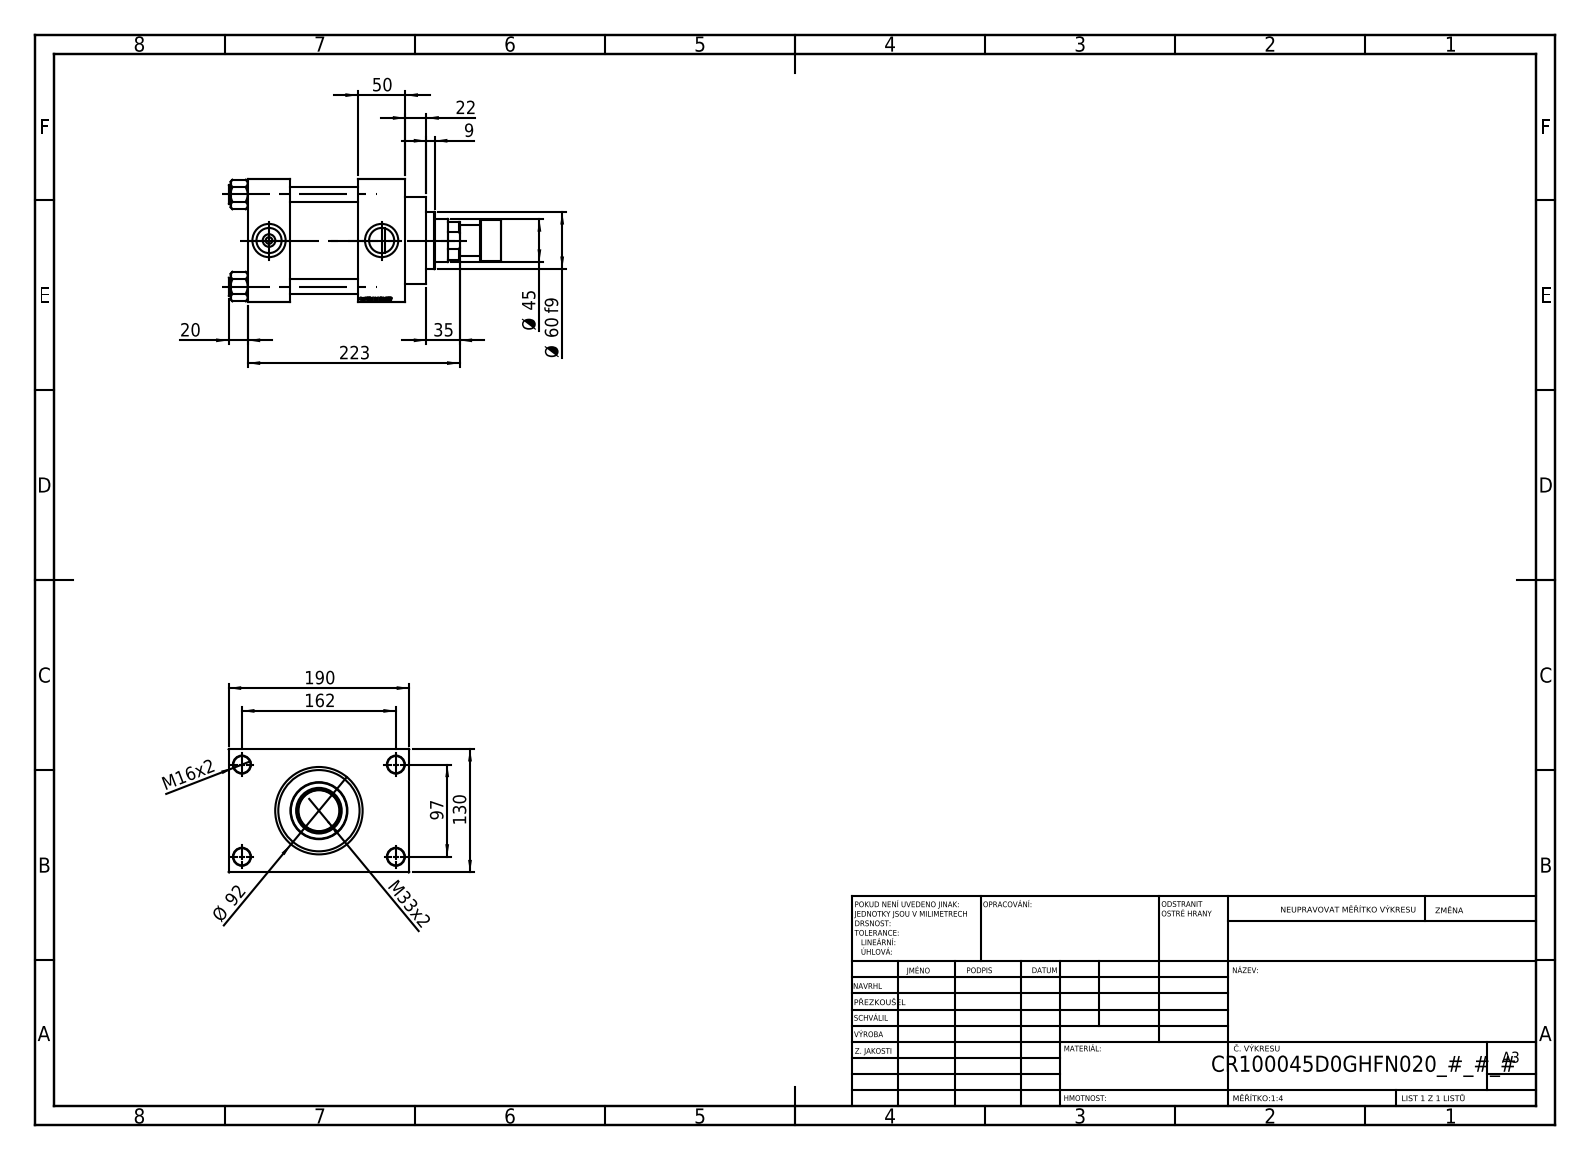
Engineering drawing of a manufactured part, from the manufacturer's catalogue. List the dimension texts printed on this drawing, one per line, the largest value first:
223
190
162
130
97
Ø 92
Ø 60 f9
50
Ø 45
35
M33x2
22
20
M16x2
9
